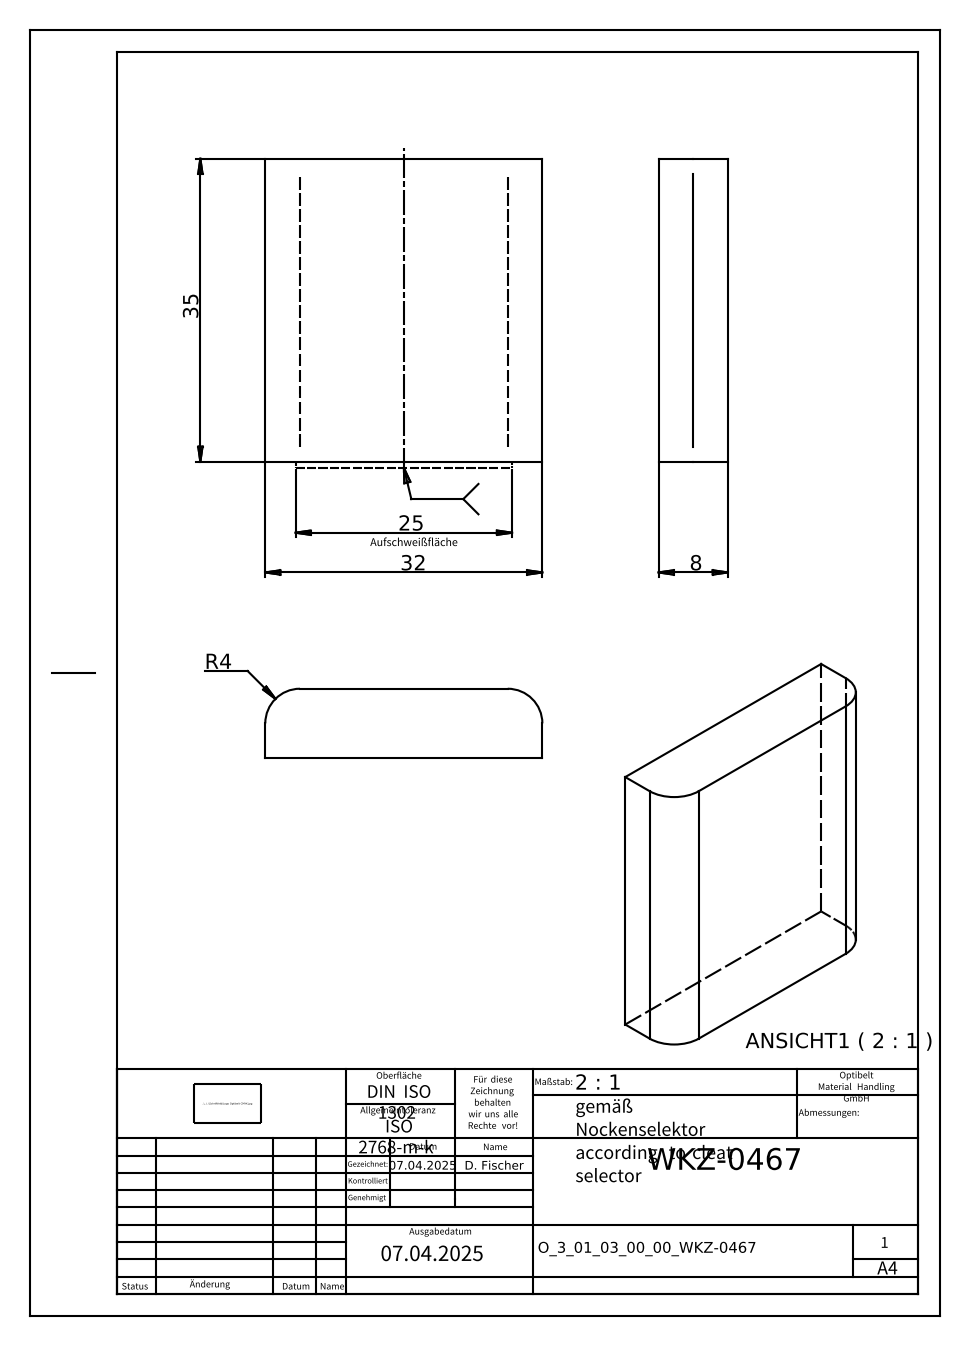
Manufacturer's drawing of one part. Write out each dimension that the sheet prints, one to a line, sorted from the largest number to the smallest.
35
32
25
8
R4
